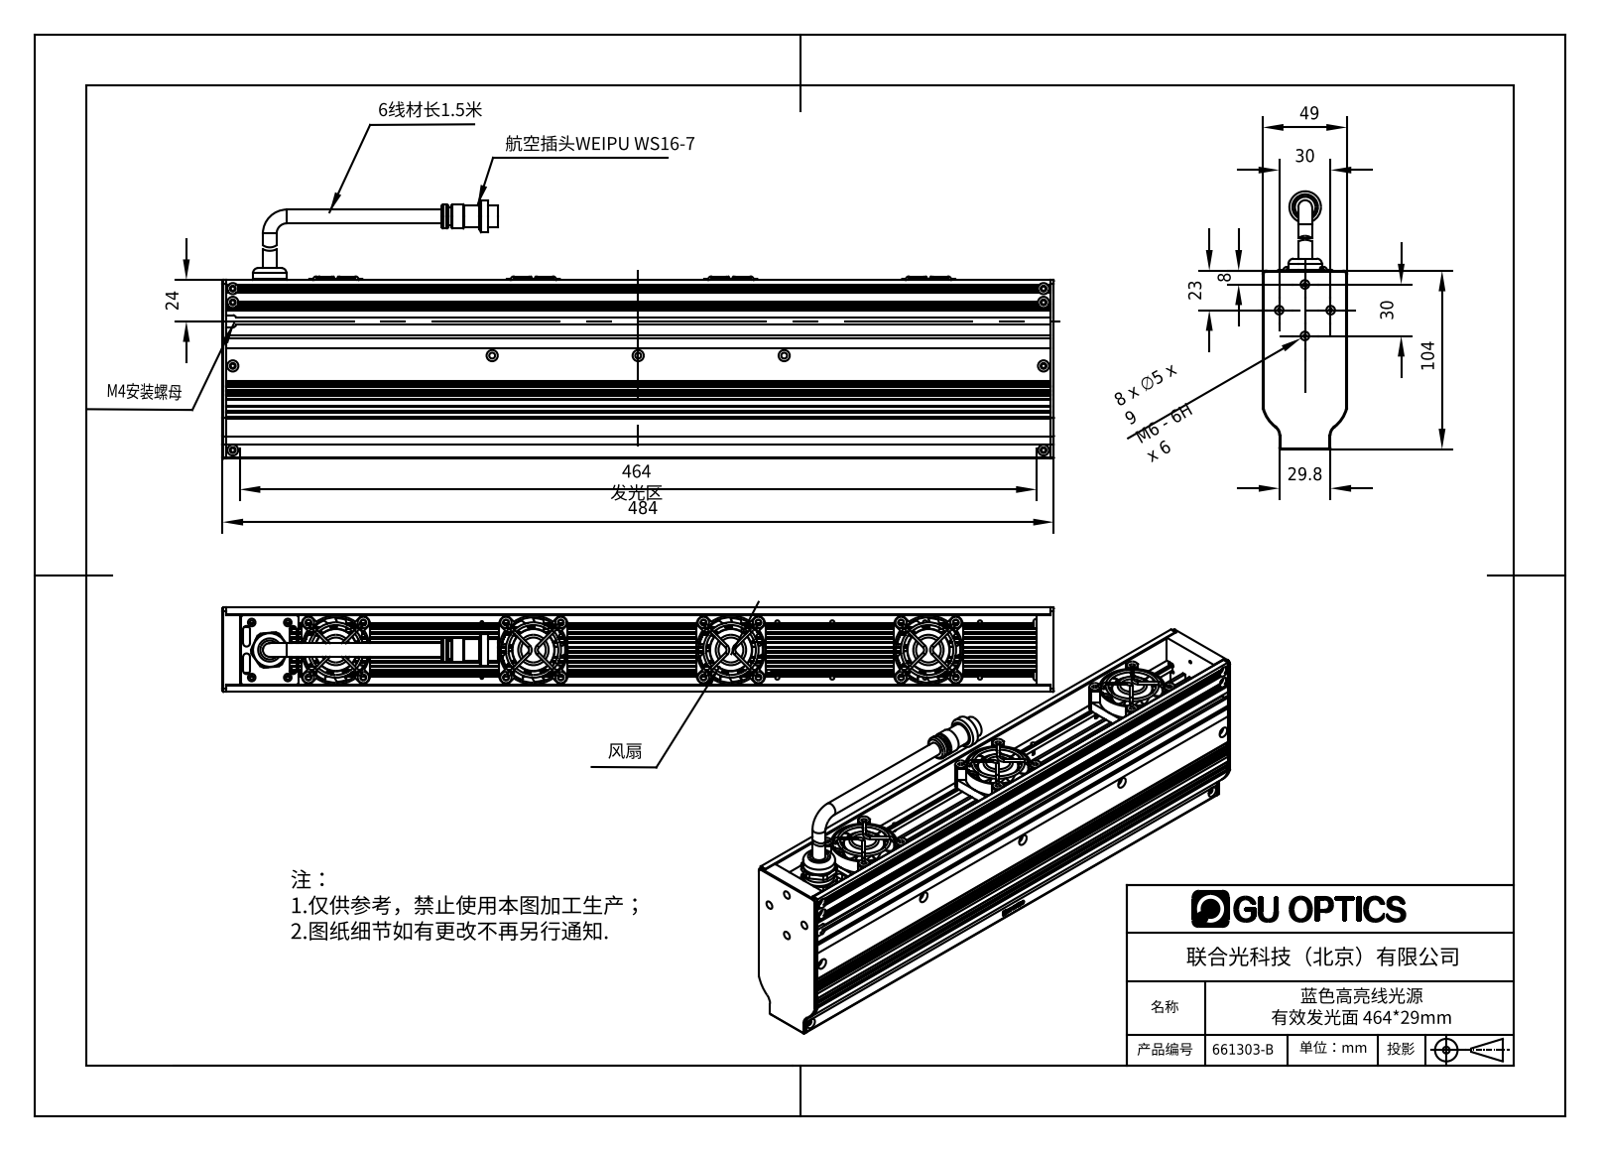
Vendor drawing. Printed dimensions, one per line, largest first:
484
464 发光区
104
49
30
30
29.8
24
23
8
8 x ∅5 x 9 M6 - 6H x 6
